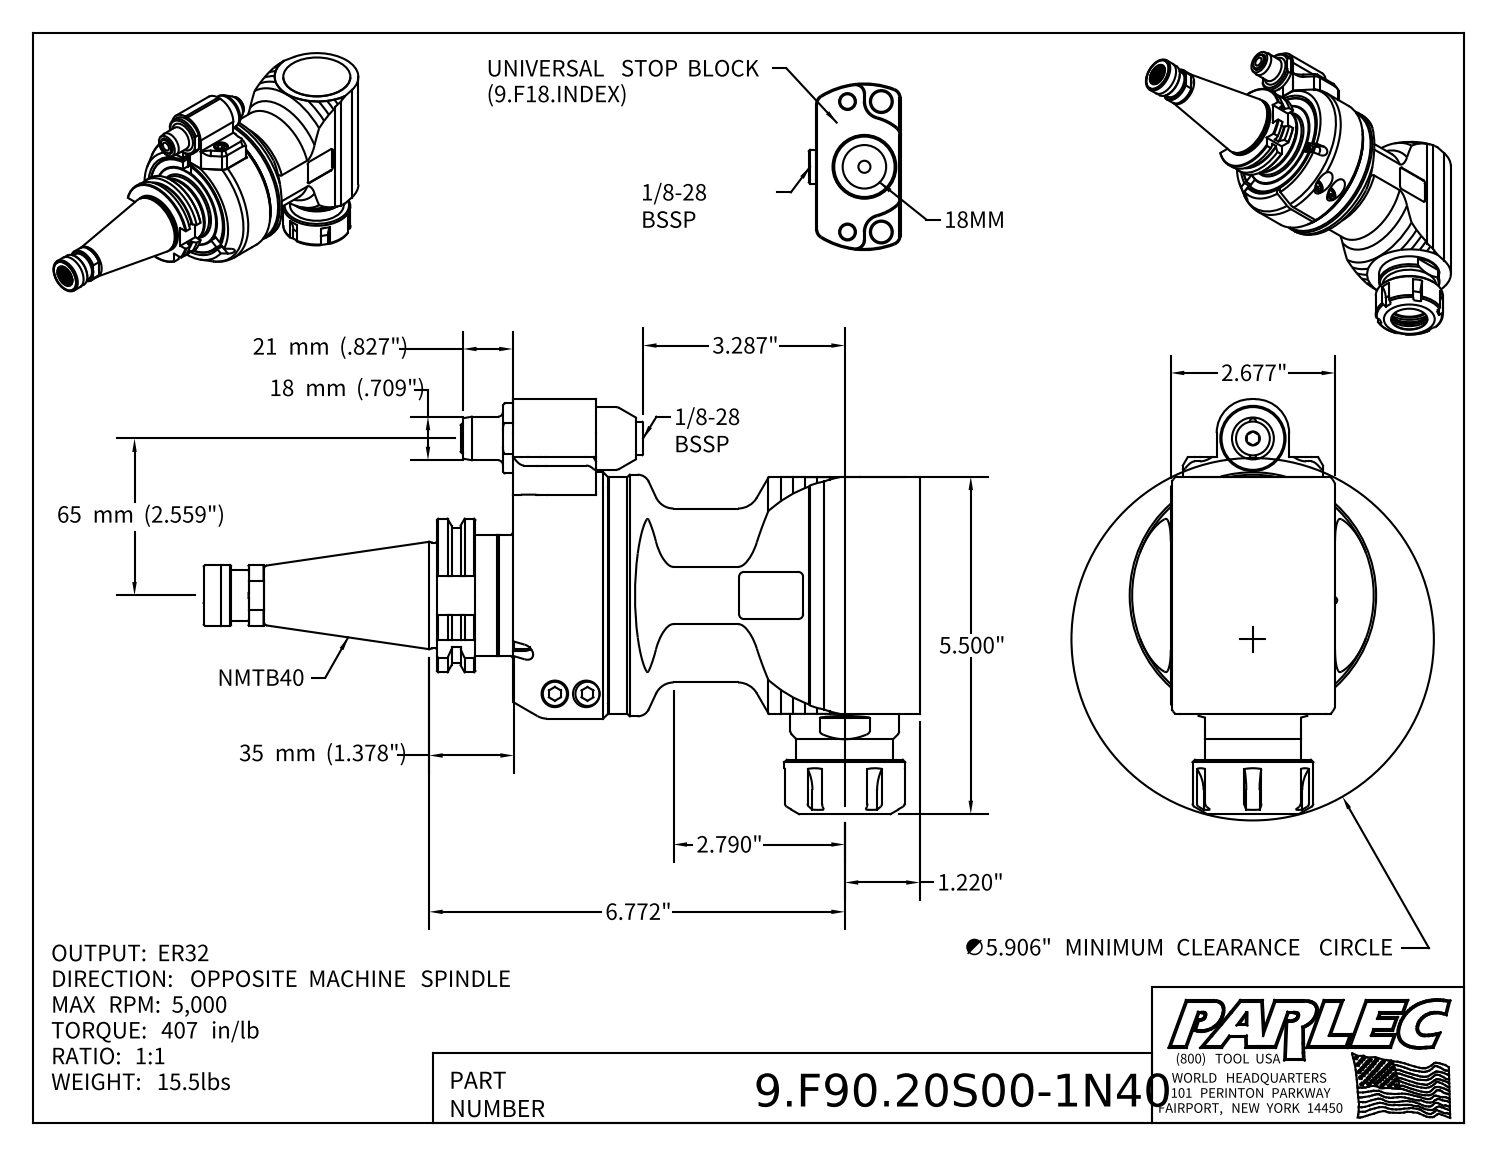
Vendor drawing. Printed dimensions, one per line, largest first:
65 mm (2.559")
35 mm (1.378")
21 mm (.827")
18 mm (.709")
6.772"
∅5.906" MINIMUM CLEARANCE CIRCLE
5.500"
3.287"
2.790"
2.677"
1.220"
